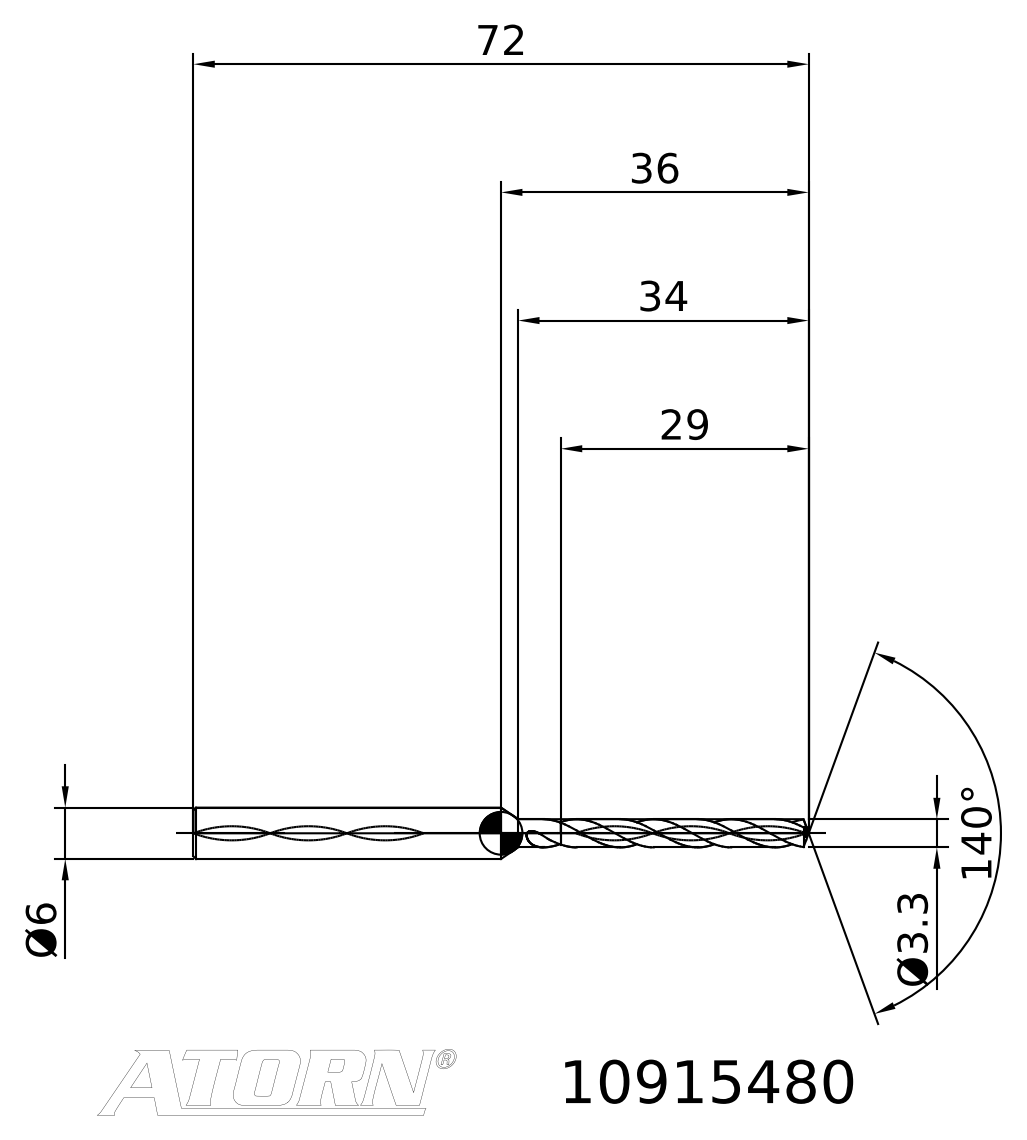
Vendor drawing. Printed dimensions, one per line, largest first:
140°
72
36
34
29
Ø6
Ø3.3
